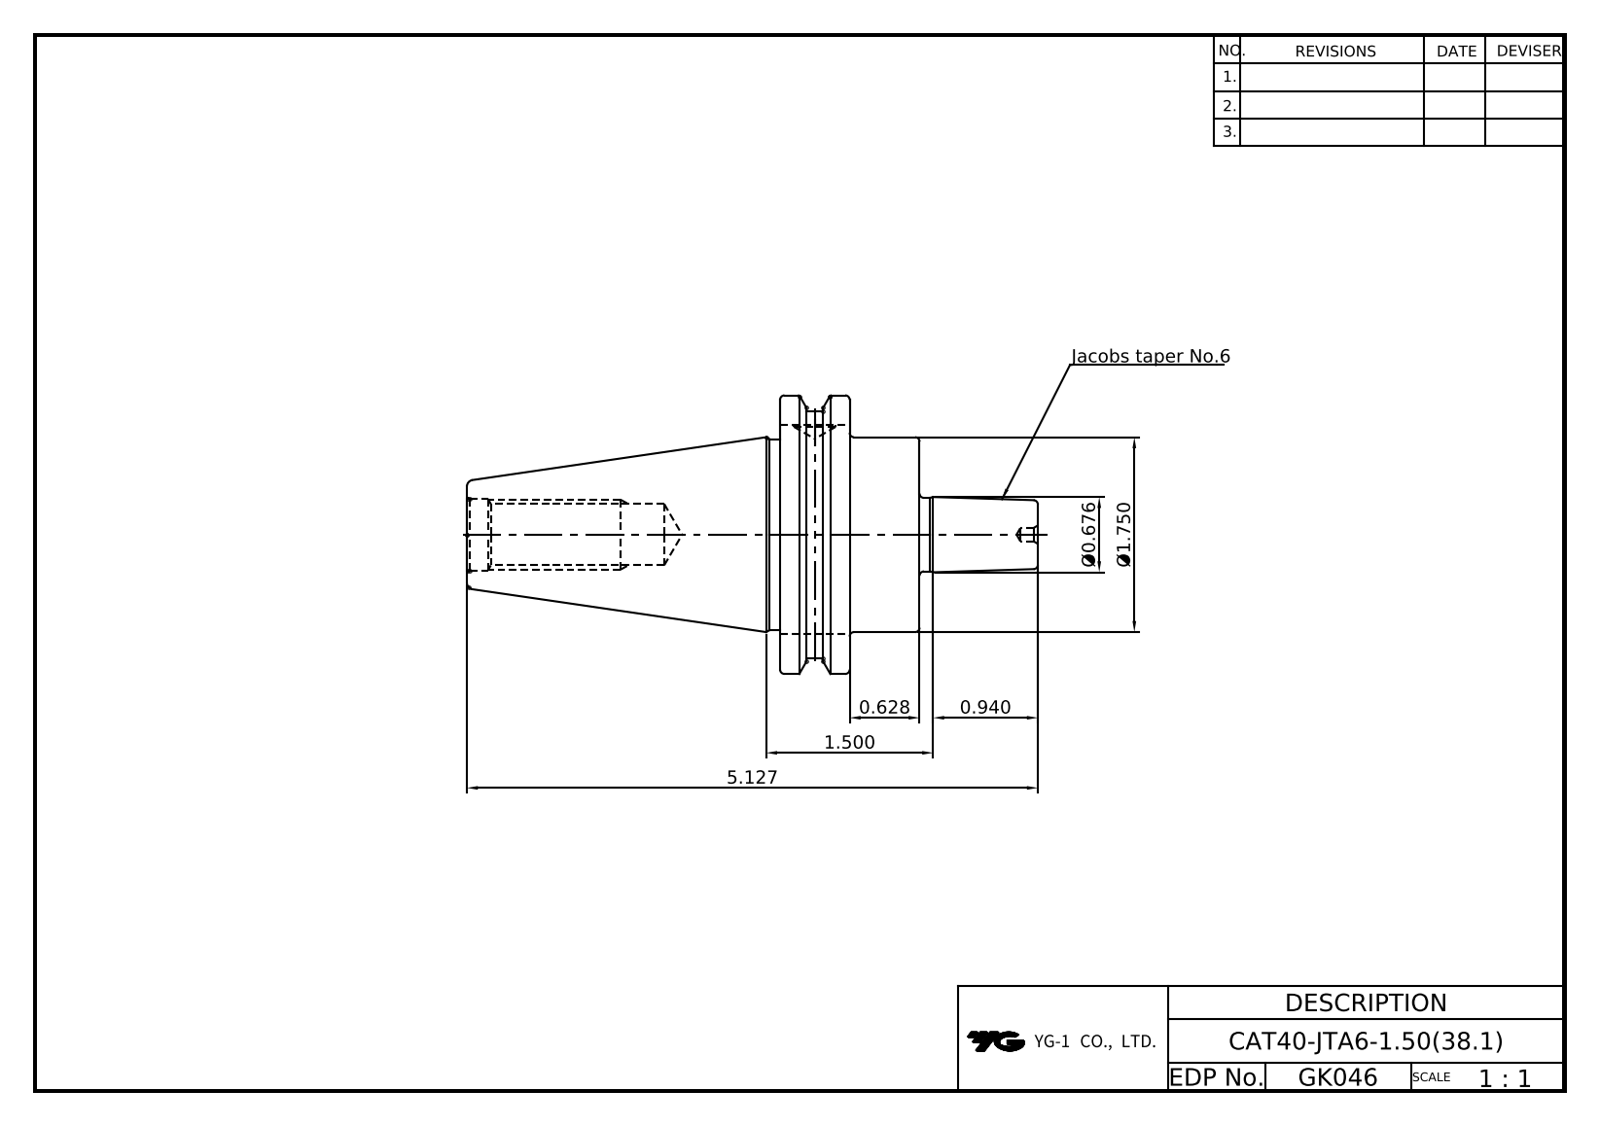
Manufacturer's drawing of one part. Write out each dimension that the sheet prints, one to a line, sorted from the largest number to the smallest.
5.127
Ø1.750
1.500
0.940
Ø0.676
0.628
